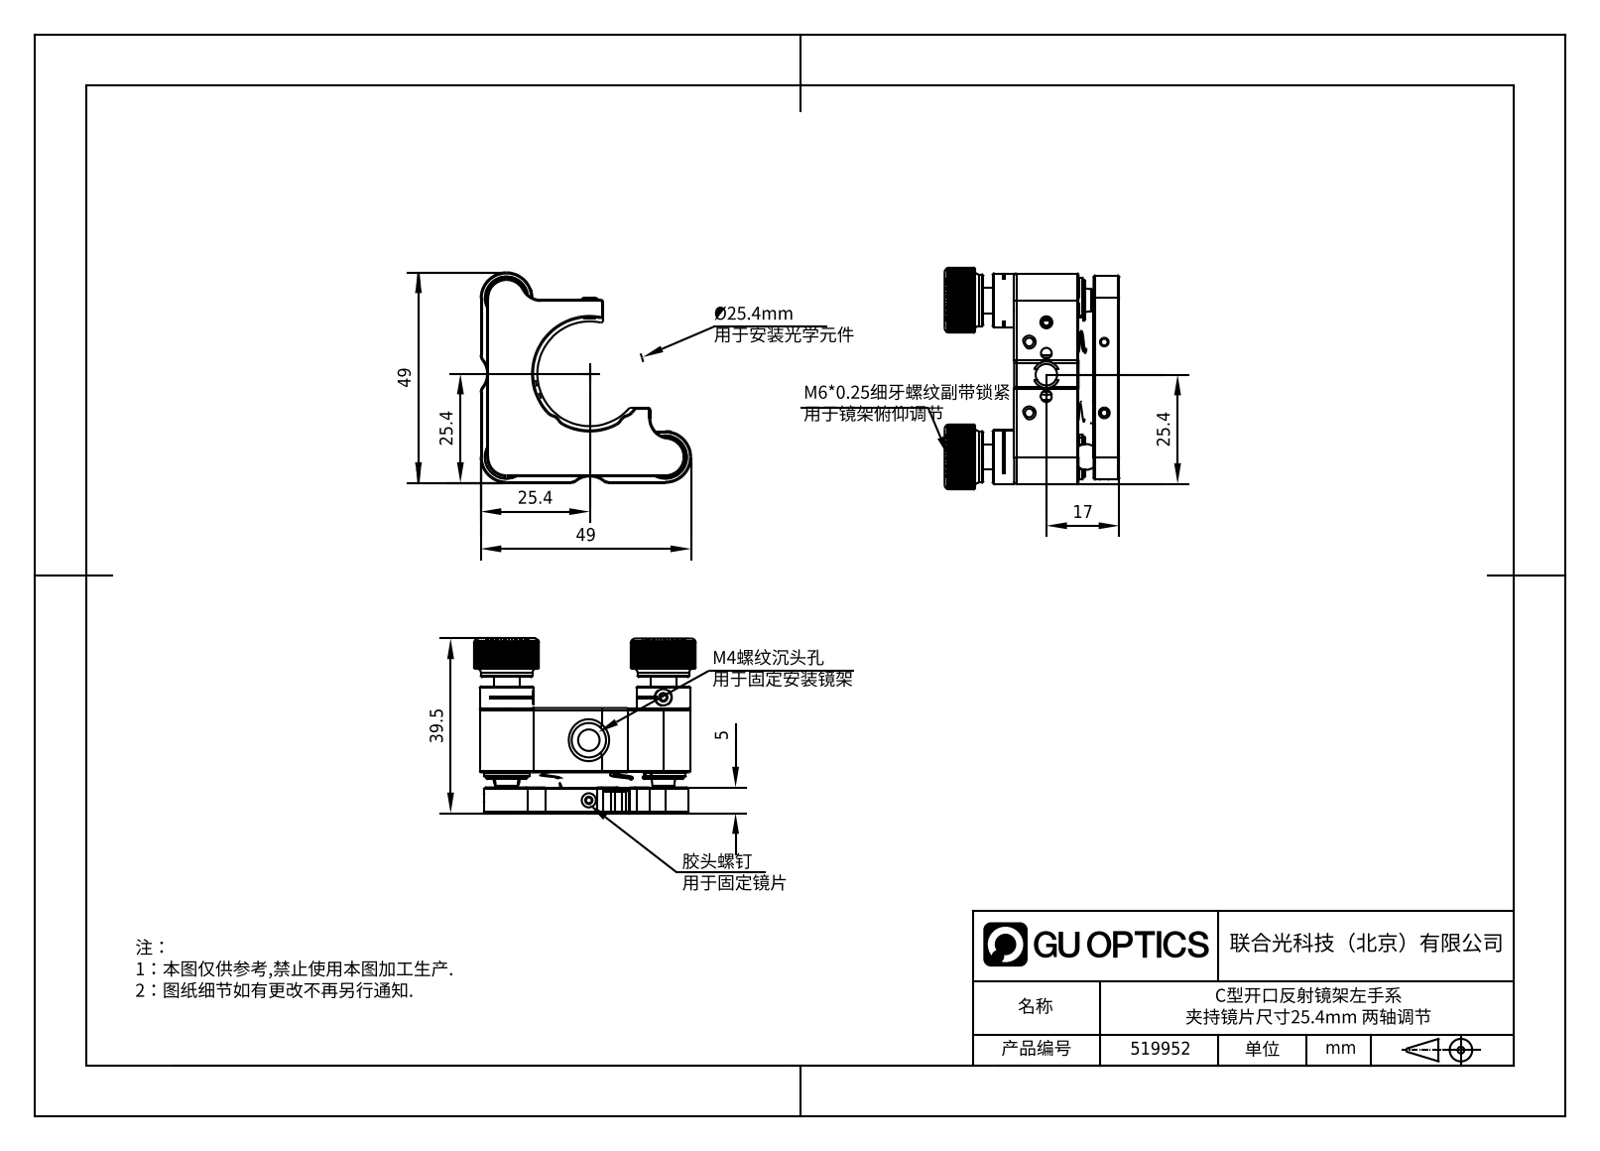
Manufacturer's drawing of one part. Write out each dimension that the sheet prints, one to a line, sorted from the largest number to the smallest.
49
49
39.5
25.4
25.4
25.4
17
5
